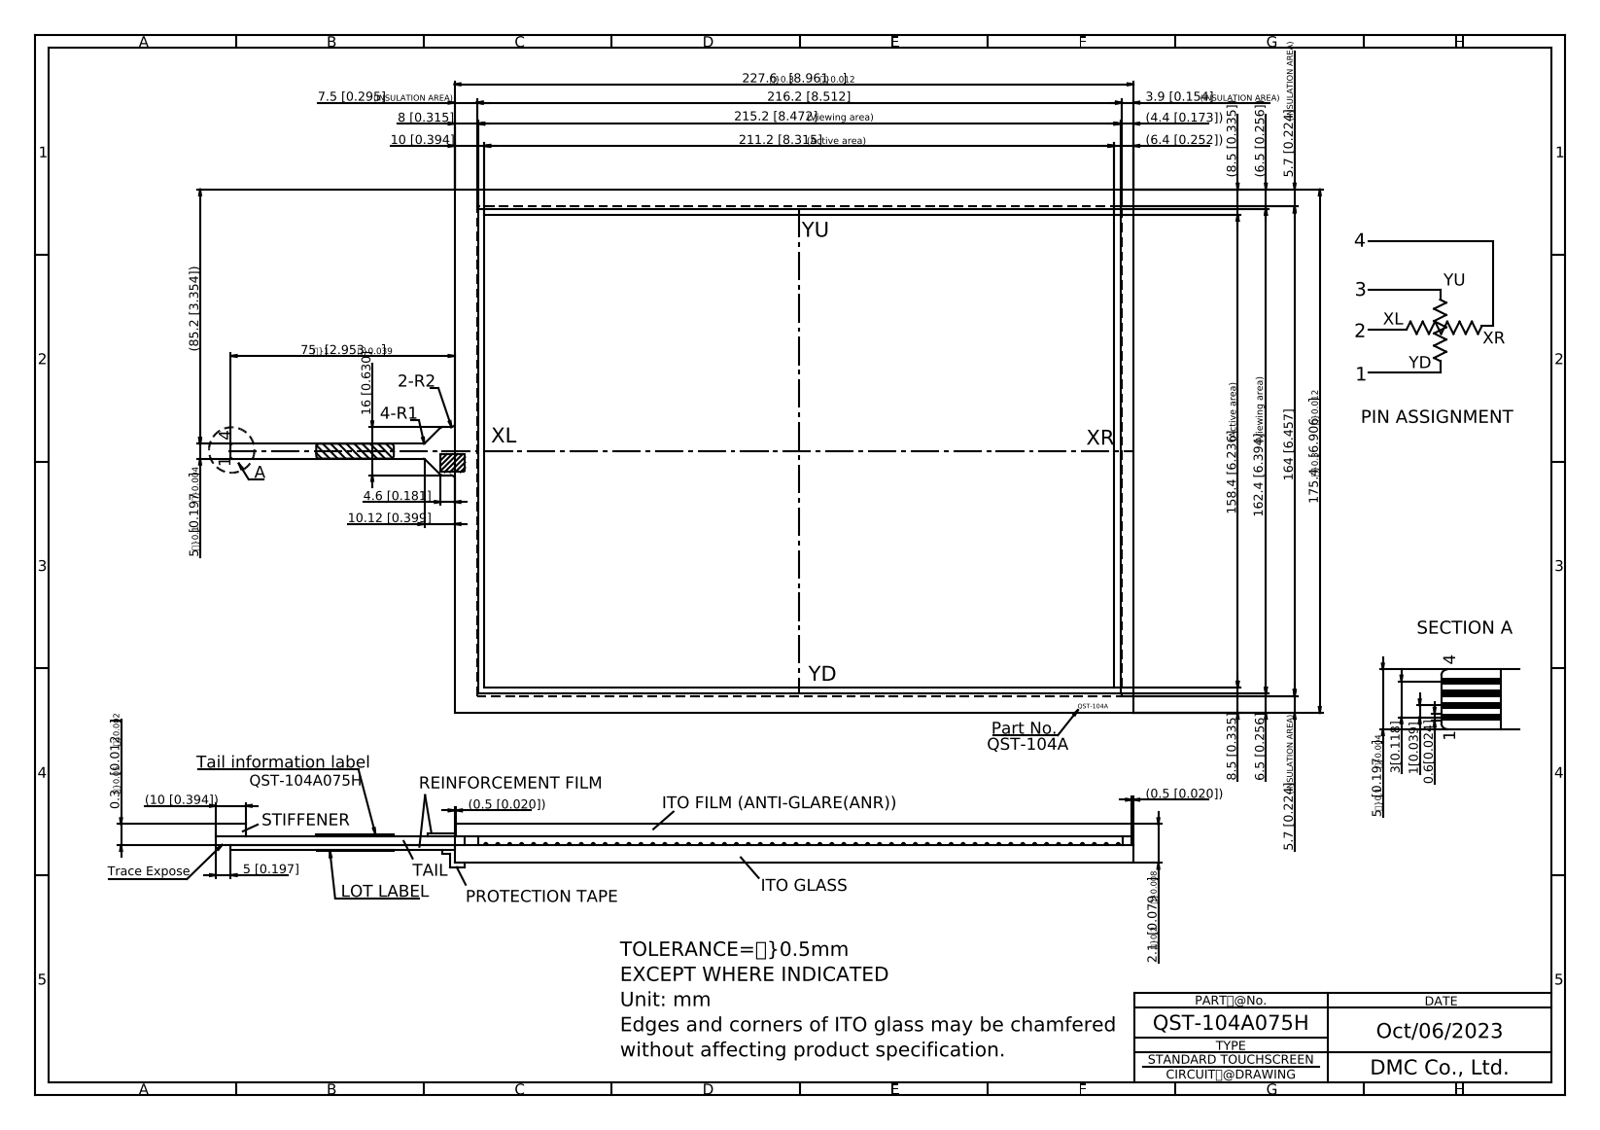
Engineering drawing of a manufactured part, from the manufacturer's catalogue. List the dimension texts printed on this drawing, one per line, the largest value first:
227.60
216.2 [8.512]
215.20 {\H0.75x;(Viewing area)}
211.20 {\H0.75x;(Active area)}
175.40
164 [6.457]
162.40 {\H0.75x;(Viewing area)}
158.40 {\H0.75x;(Active area)}
(85.2 [3.354])
75.00
16 [0.630]
10.12 [0.399]
10 [0.394]
(10 [0.394])
(8.5 [0.335])
8.5 [0.335]
8 [0.315]
7.50{\H0.6563x;(INSULATION AREA)}
(6.5 [0.256])
6.5 [0.256]
(6.4 [0.252])
5.70{\H0.6563x;(INSULATION AREA)}
5.70{\H0.6563x;(INSULATION AREA)}
5.00
5 [0.197]
5{\H0.6667x;?}0.1}[0.197{\H0.6667x;?}0.004}]
4.6 [0.181]
(4.4 [0.173])
3.90{\H0.6563x;(INSULATION AREA)}
3[0.118]
2.1{\H0.6563x;?}0.2}[0.079{\H0.6563x;?}0.008}]
1[0.039]
0.6[0.024]
(0.5 [0.020])
(0.5 [0.020])
0.3{\H0.6563x;?}0.05}[0.012{\H0.6563x;?}0.002}]
